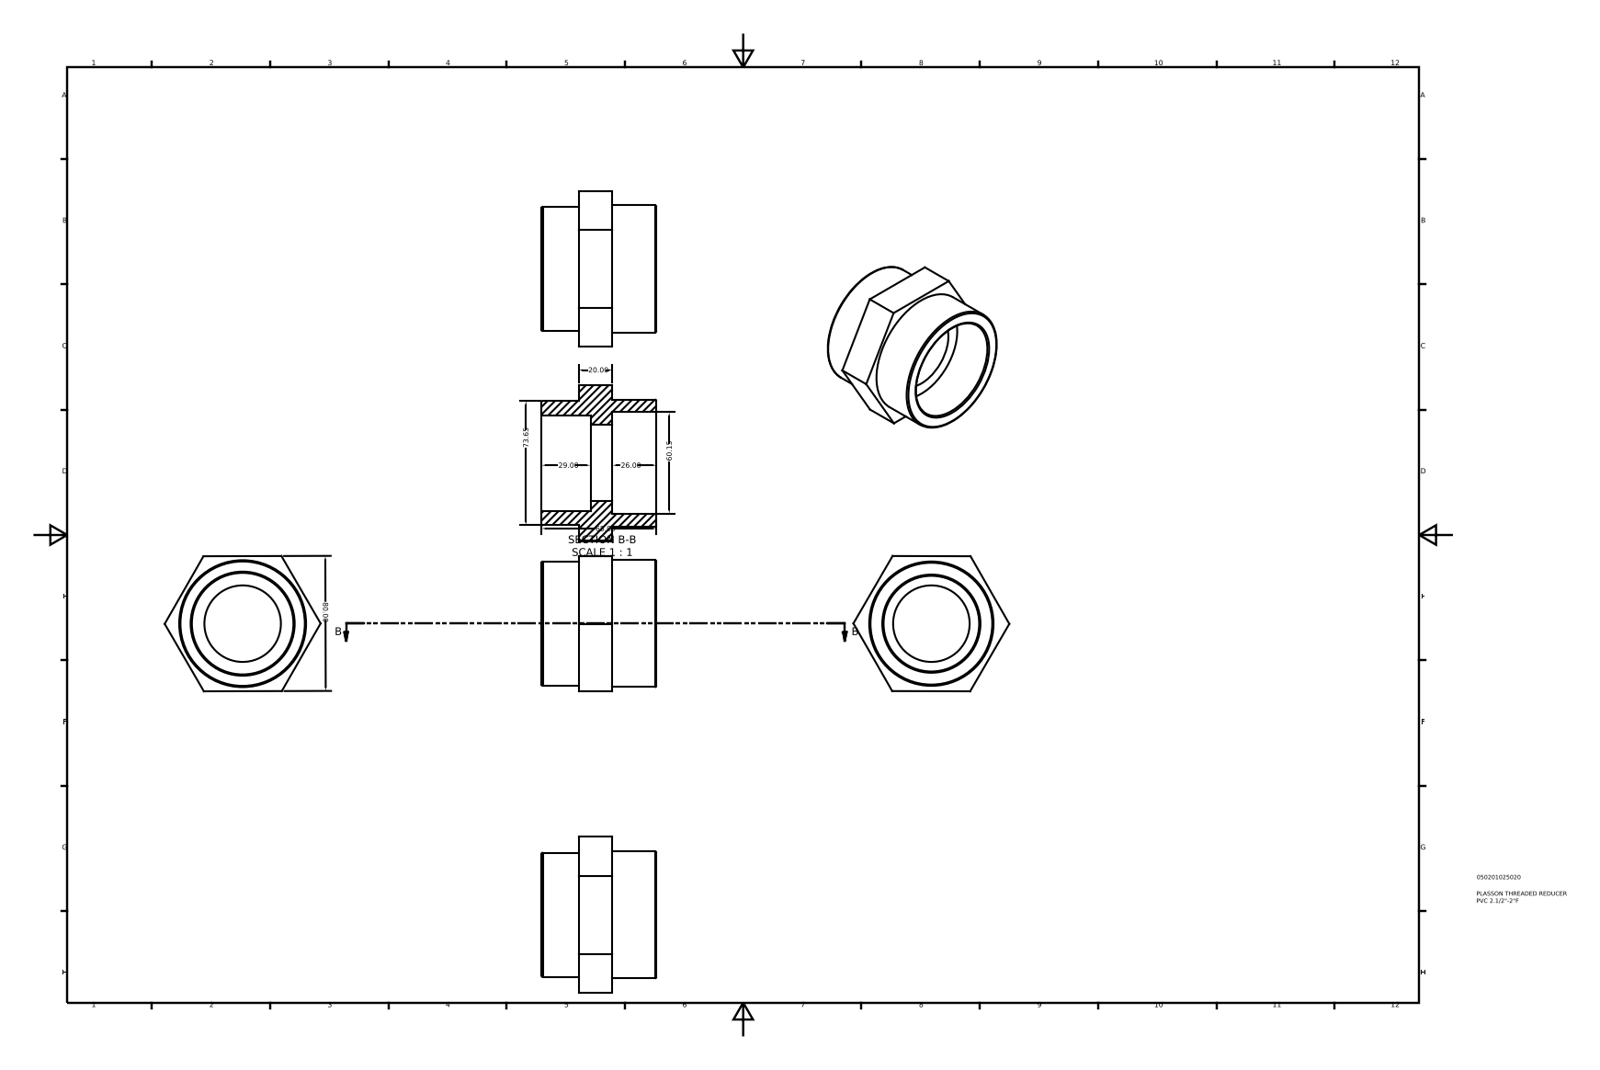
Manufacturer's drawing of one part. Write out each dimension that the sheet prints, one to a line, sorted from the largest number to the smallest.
80.00
73.65
68.00
60.15
29.00
26.00
20.00
